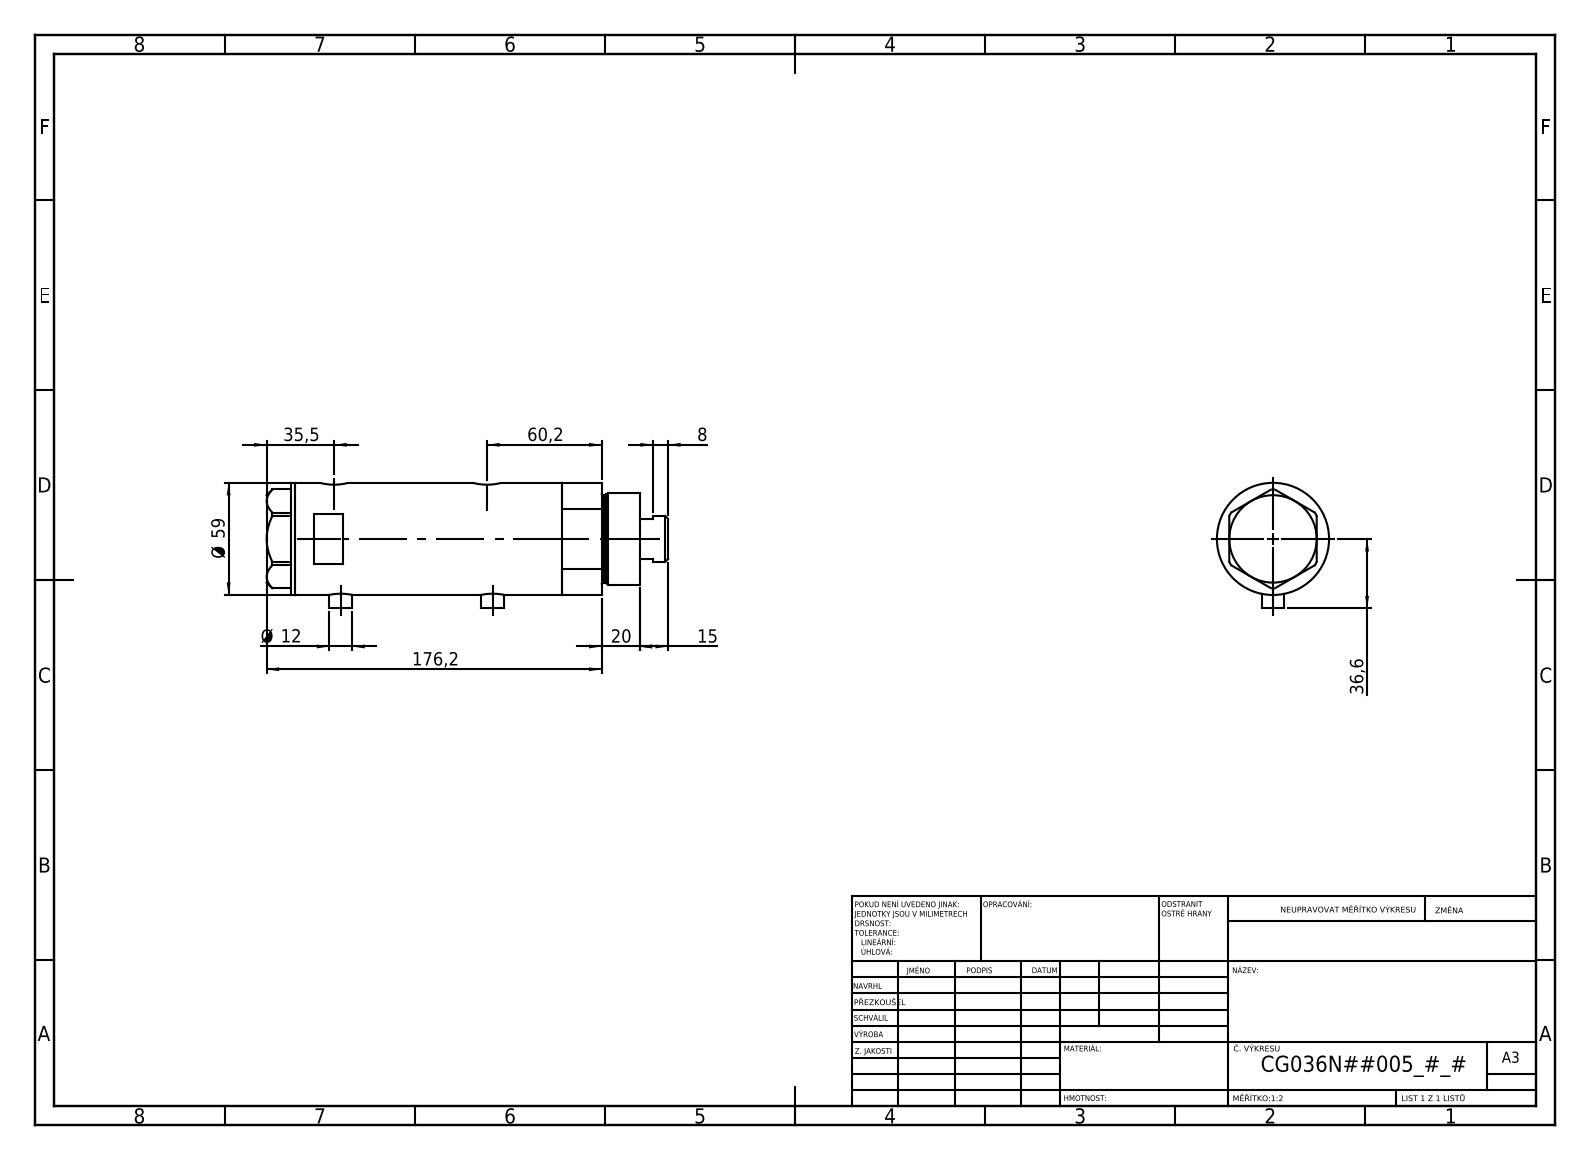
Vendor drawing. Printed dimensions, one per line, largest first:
176,2
60,2
Ø 59
36,6
35,5
20
15
Ø 12
8
